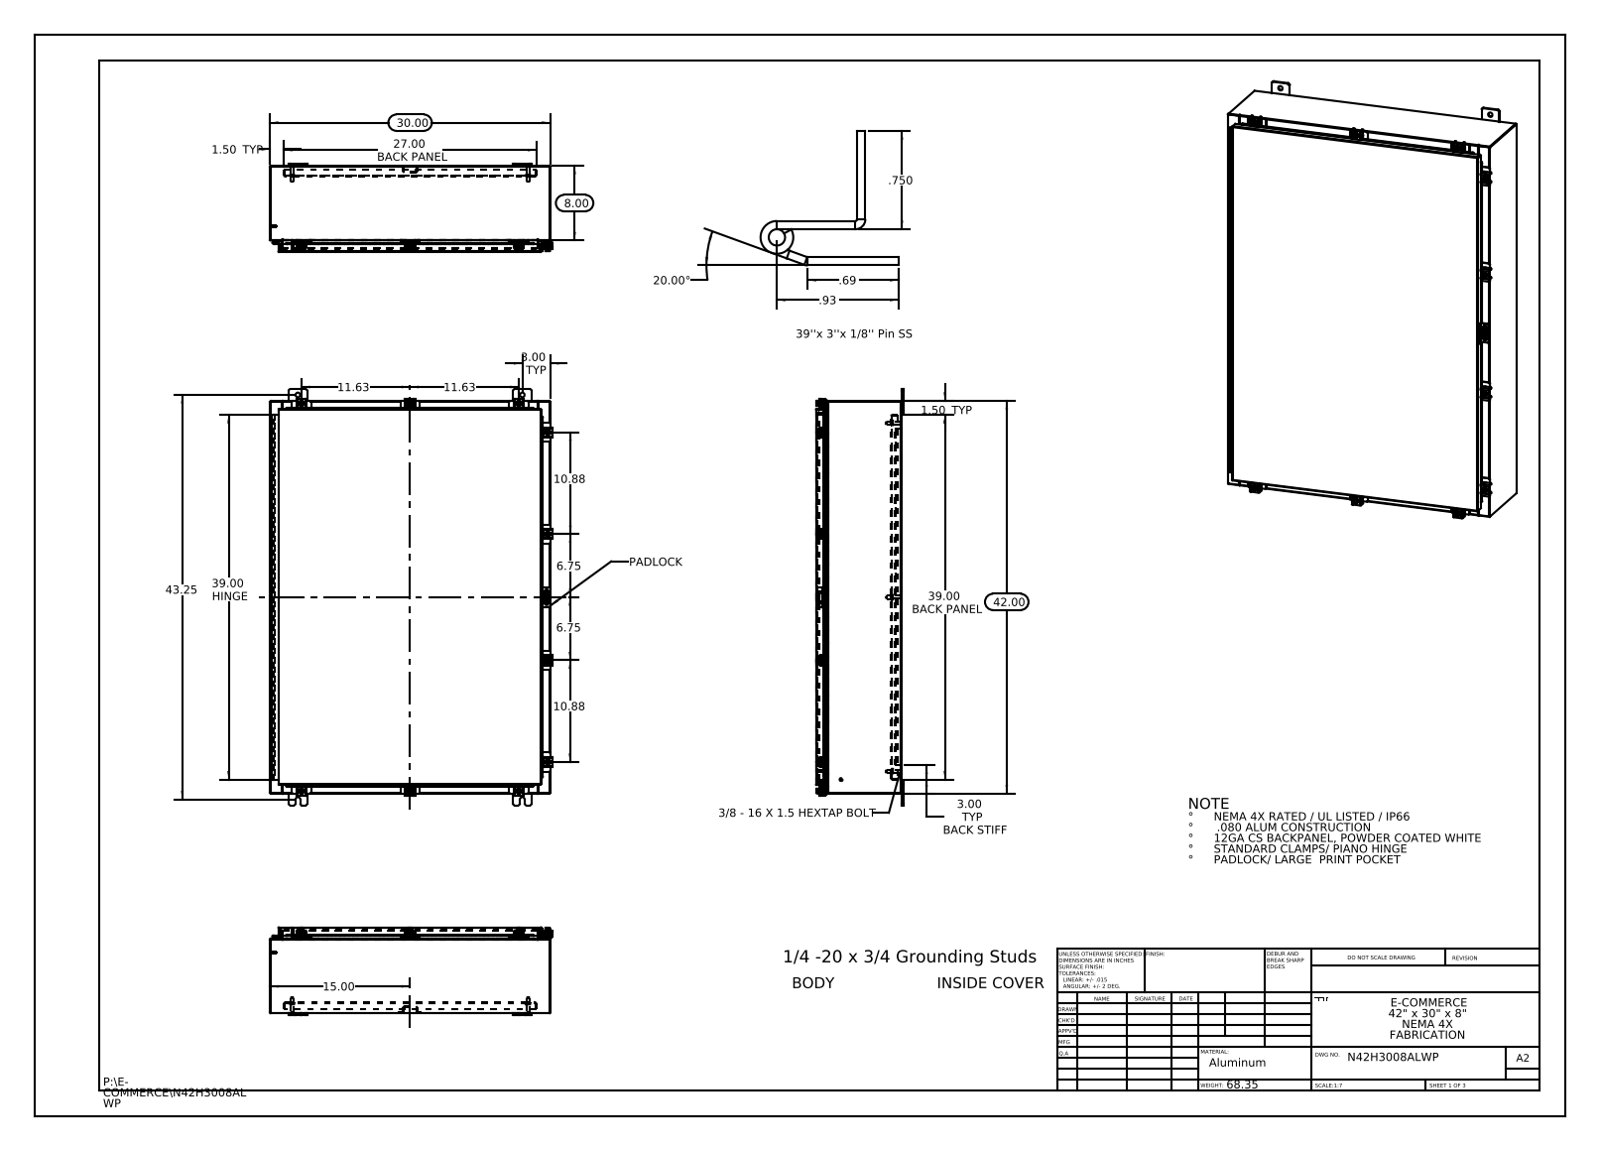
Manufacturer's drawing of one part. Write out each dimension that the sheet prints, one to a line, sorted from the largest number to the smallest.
43.25
42.00
39.00 HINGE
39.00 BACK PANEL
30.00
27.00 BACK PANEL
20.00°
15.00
11.63
11.63
10.88
10.88
8.00
6.75
6.75
3.00 TYP
3.00 TYP BACK STIFF
1.50 TYP
1.50 TYP
.93
.750
.69
